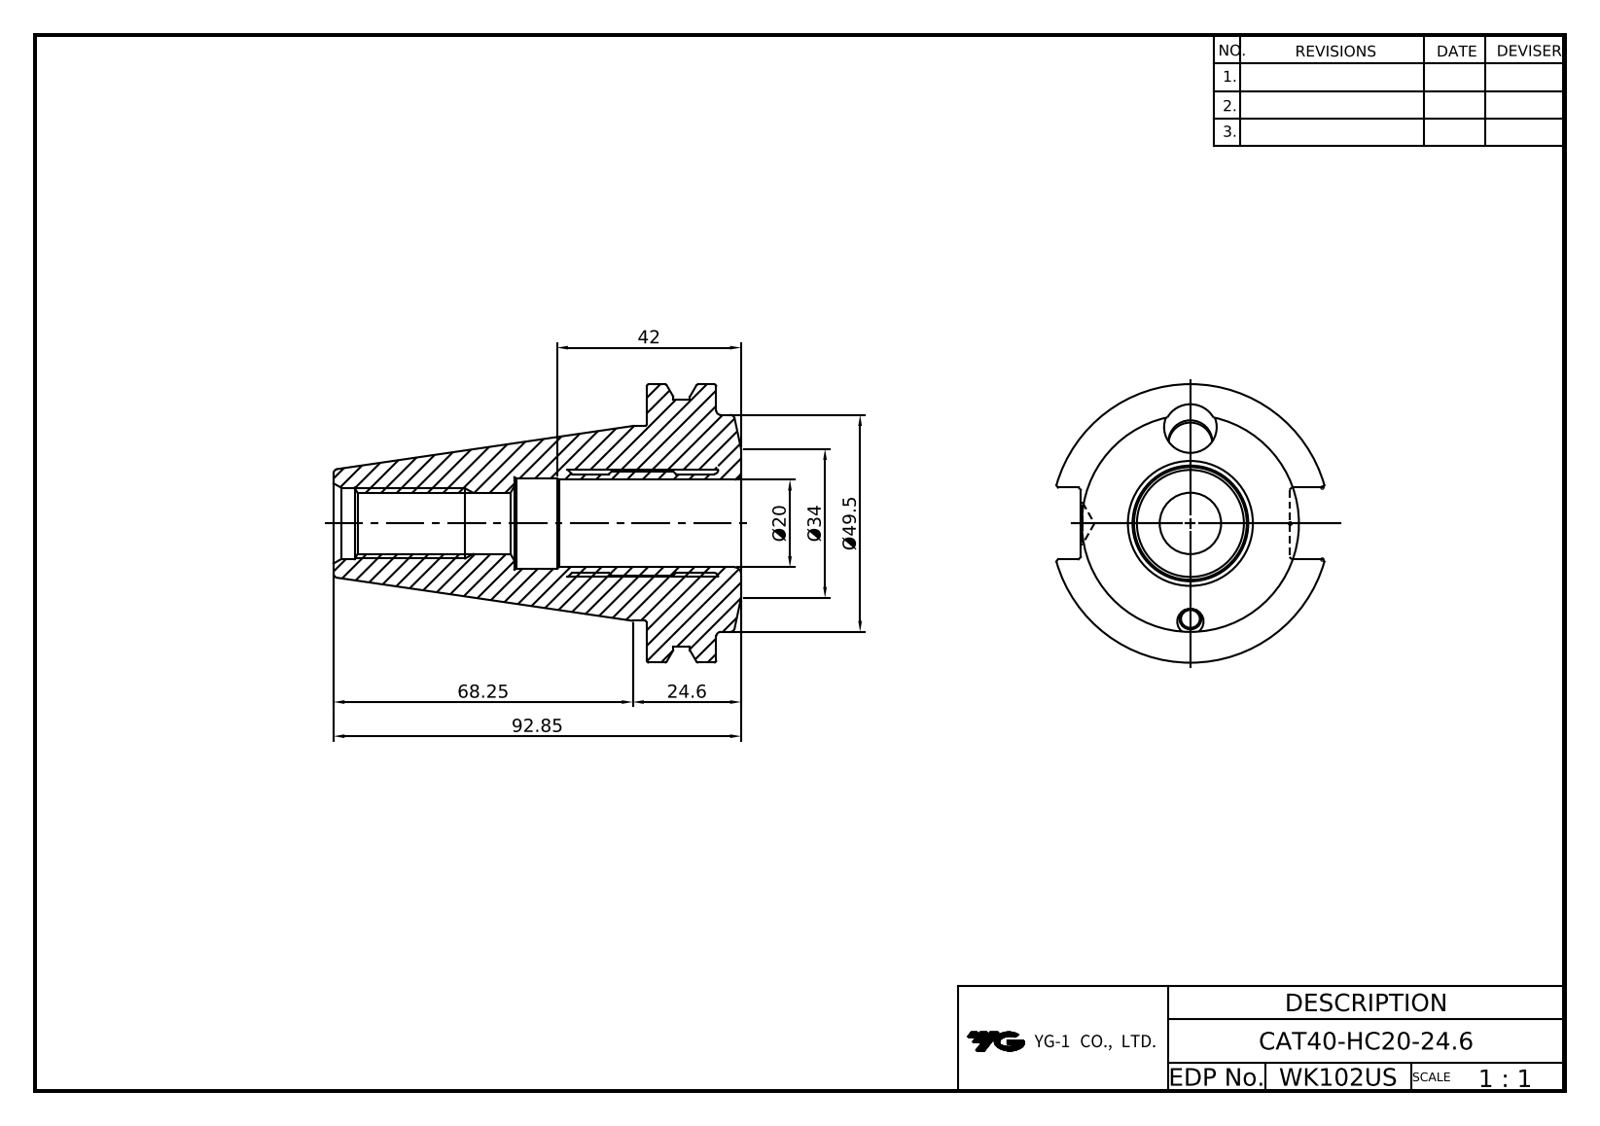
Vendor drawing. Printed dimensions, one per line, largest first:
92.85
68.25
Ø49.5
42
Ø34
24.6
Ø20
